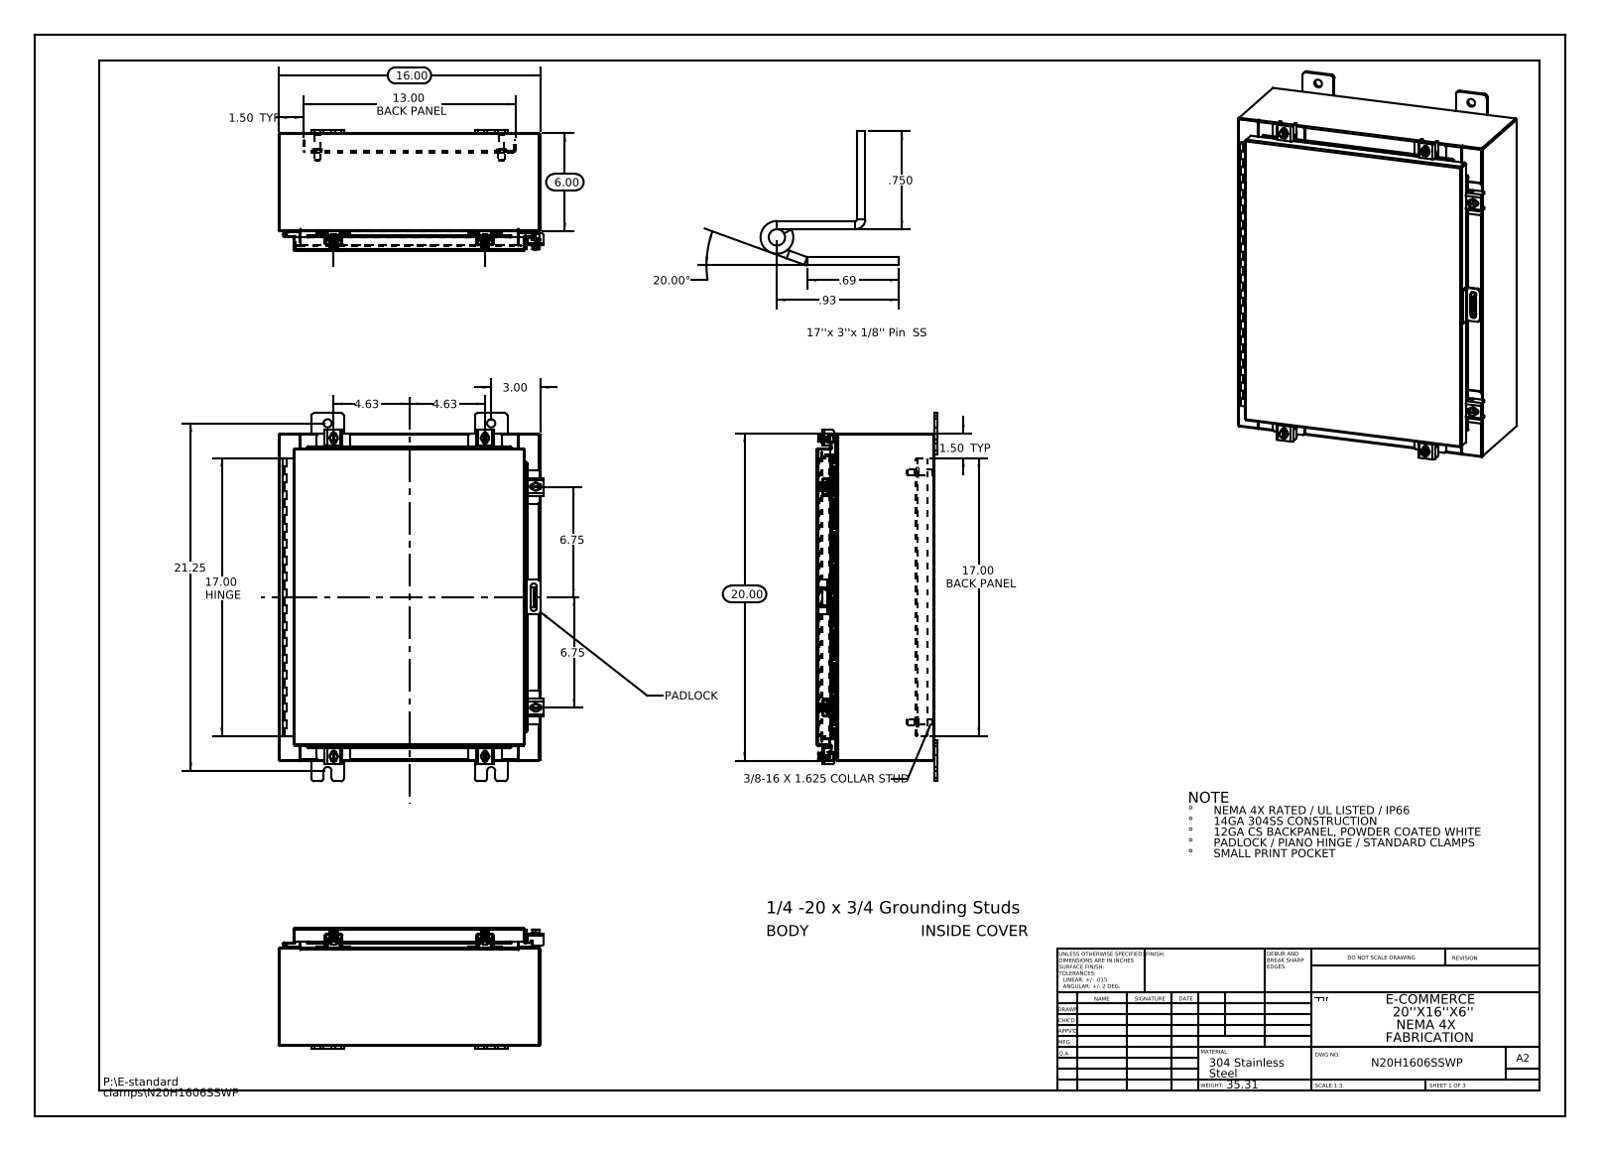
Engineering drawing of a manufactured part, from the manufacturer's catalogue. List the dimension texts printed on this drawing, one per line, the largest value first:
21.25
20.00
20.00°
17.00 HINGE
17.00 BACK PANEL
16.00
13.00 BACK PANEL
6.75
6.75
6.00
4.63
4.63
3.00
1.50 TYP
1.50 TYP
.93
.750
.69
